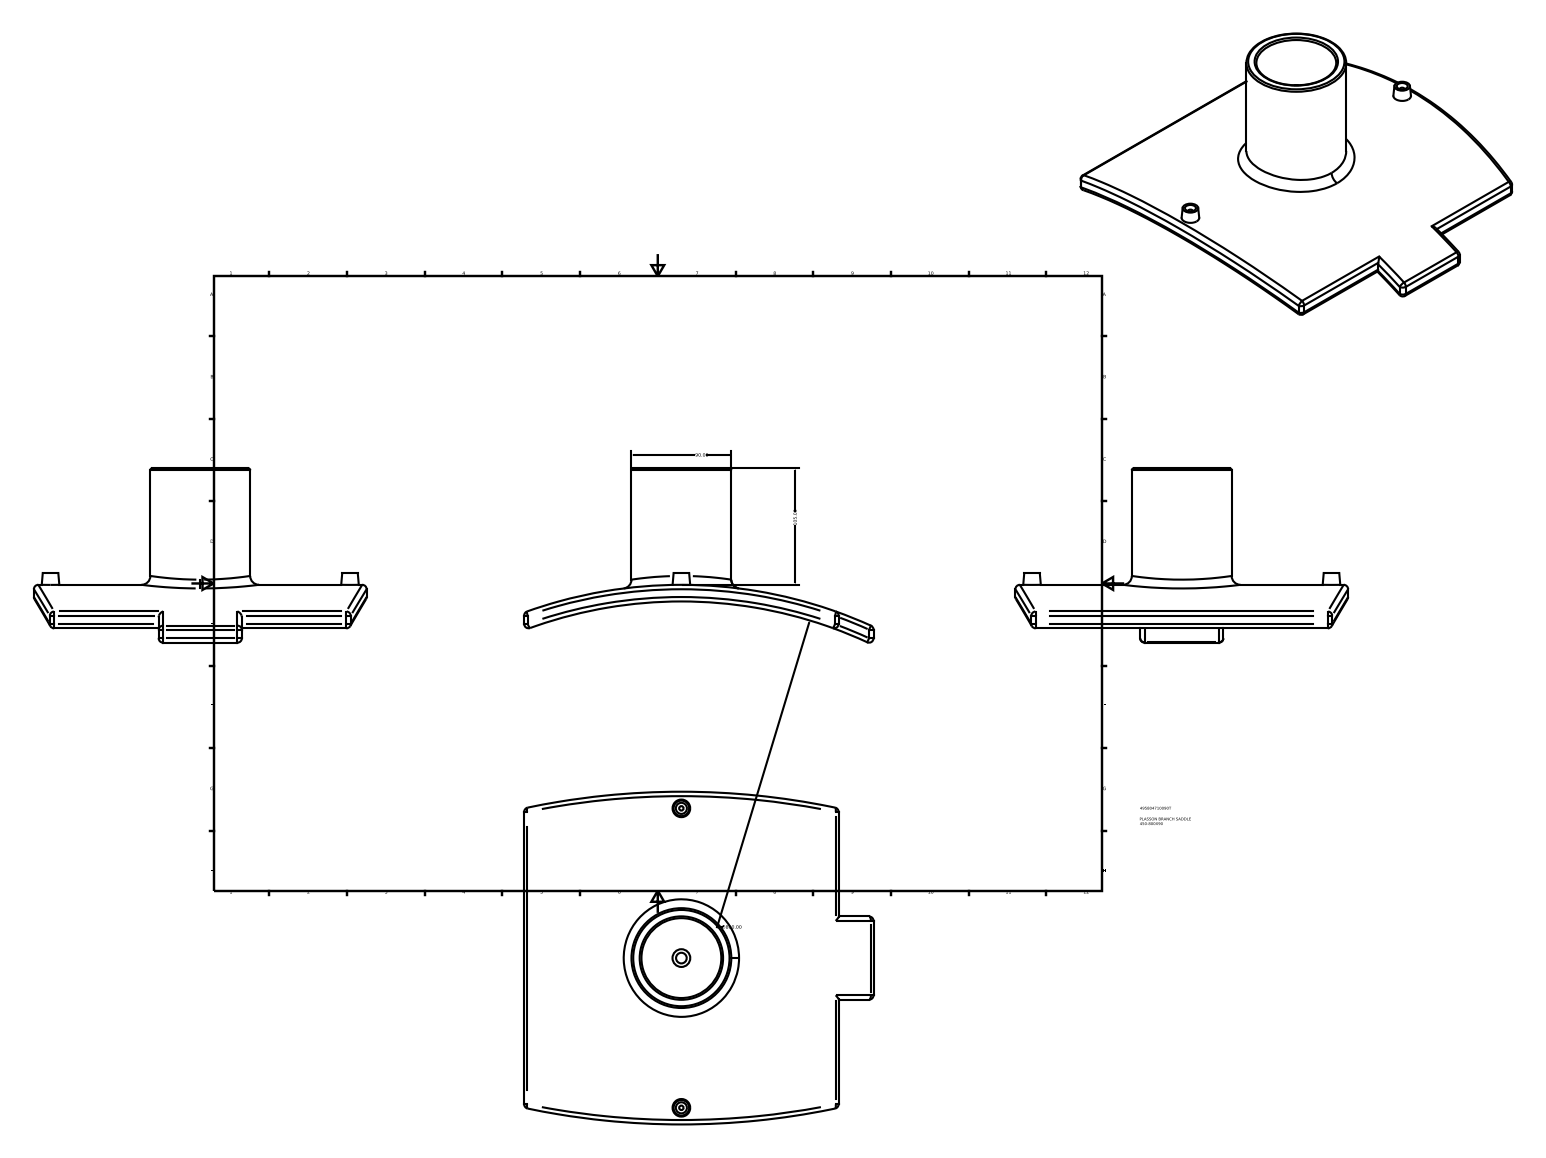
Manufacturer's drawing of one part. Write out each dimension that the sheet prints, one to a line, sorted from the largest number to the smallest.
∅800.00
105.00
90.00
